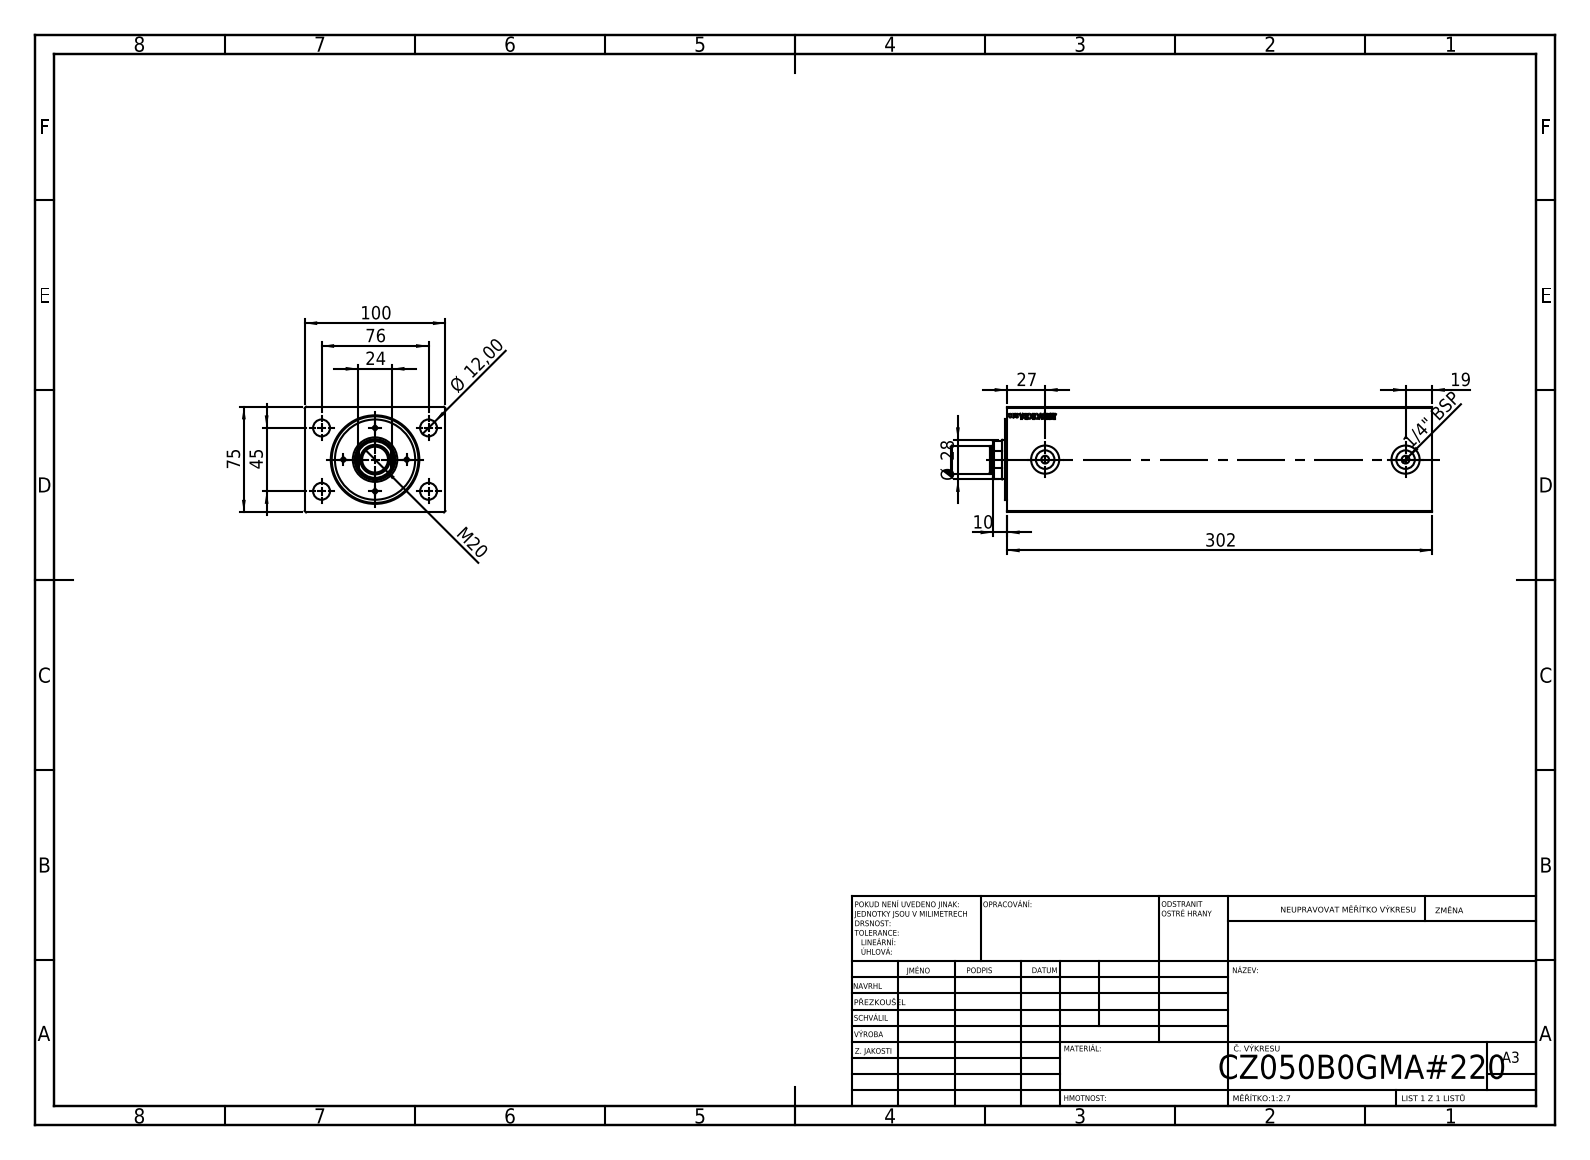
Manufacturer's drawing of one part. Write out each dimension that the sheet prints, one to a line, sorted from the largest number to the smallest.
302
100
76
75
45
Ø 28
27
24
M20
19
Ø 12,00
10
1/4" BSP
